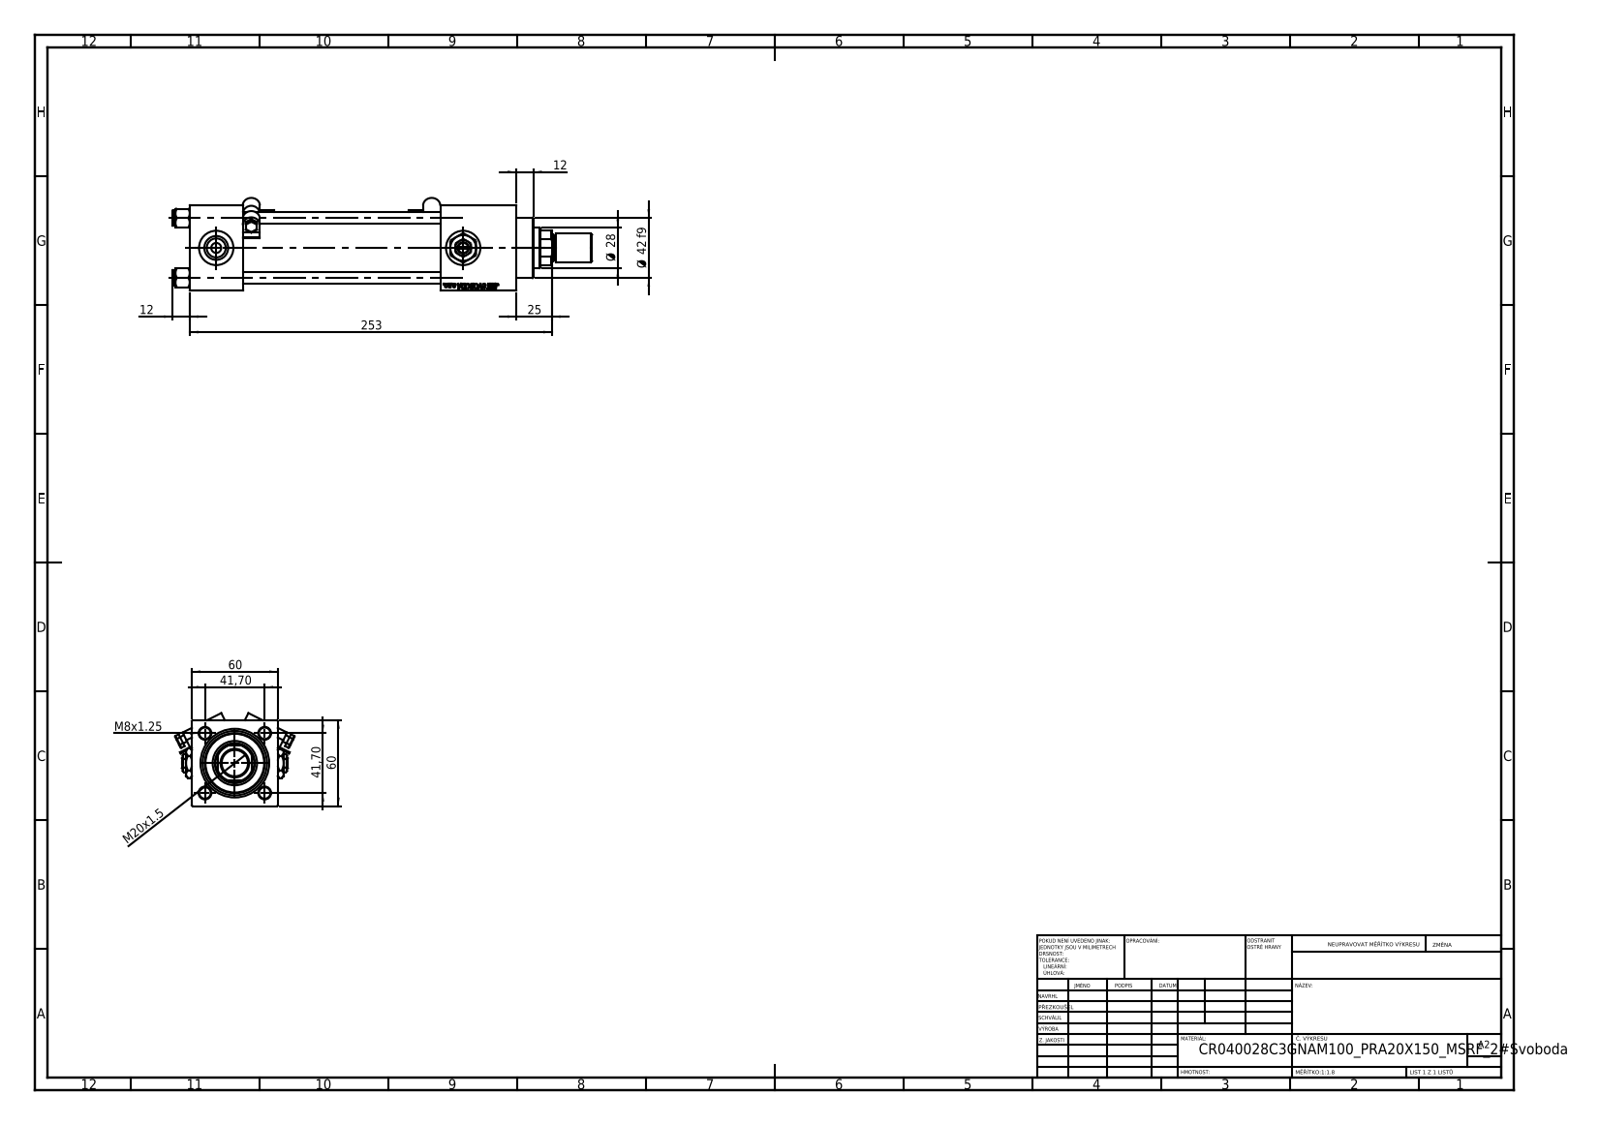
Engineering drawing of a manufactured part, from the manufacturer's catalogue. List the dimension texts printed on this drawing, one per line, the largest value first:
253
60
60
Ø 42 f9
41,70
41,70
Ø 28
25
M20x1.5
12
12
M8x1.25
